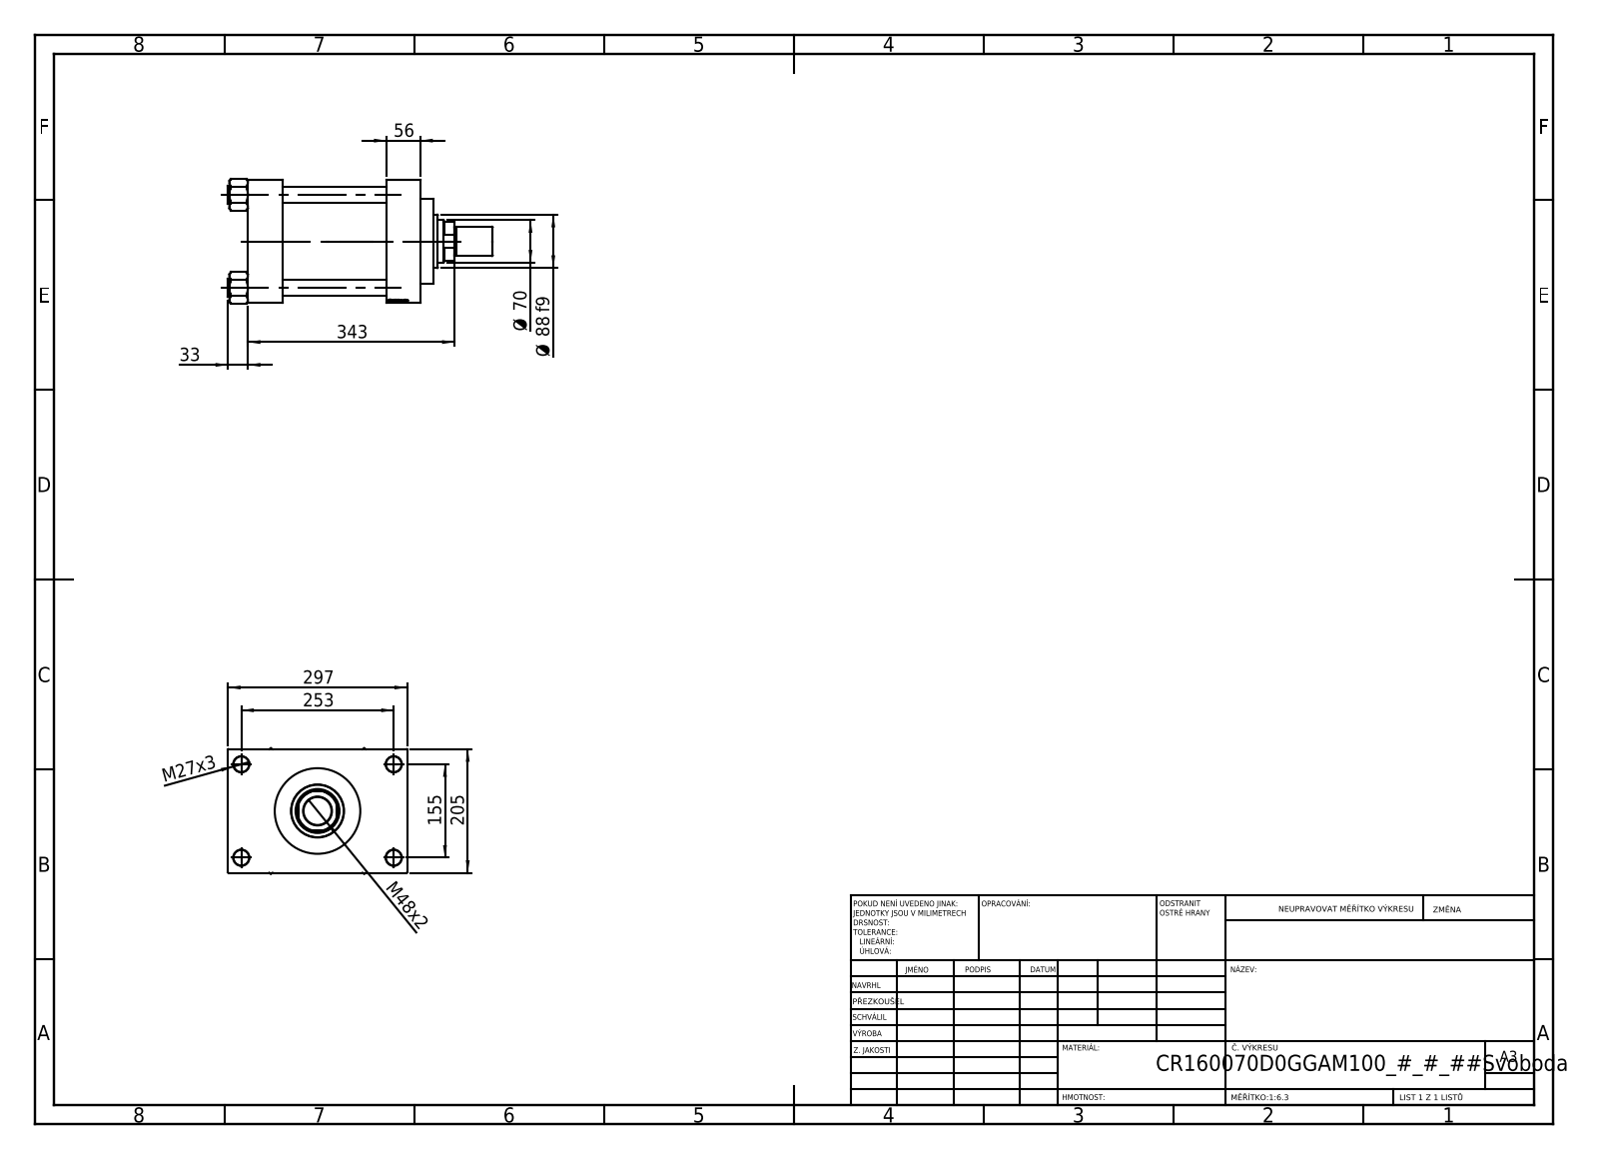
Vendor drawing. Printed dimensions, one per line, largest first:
343
297
253
205
155
Ø 88 f9
Ø 70
56
M48x2
33
M27x3
